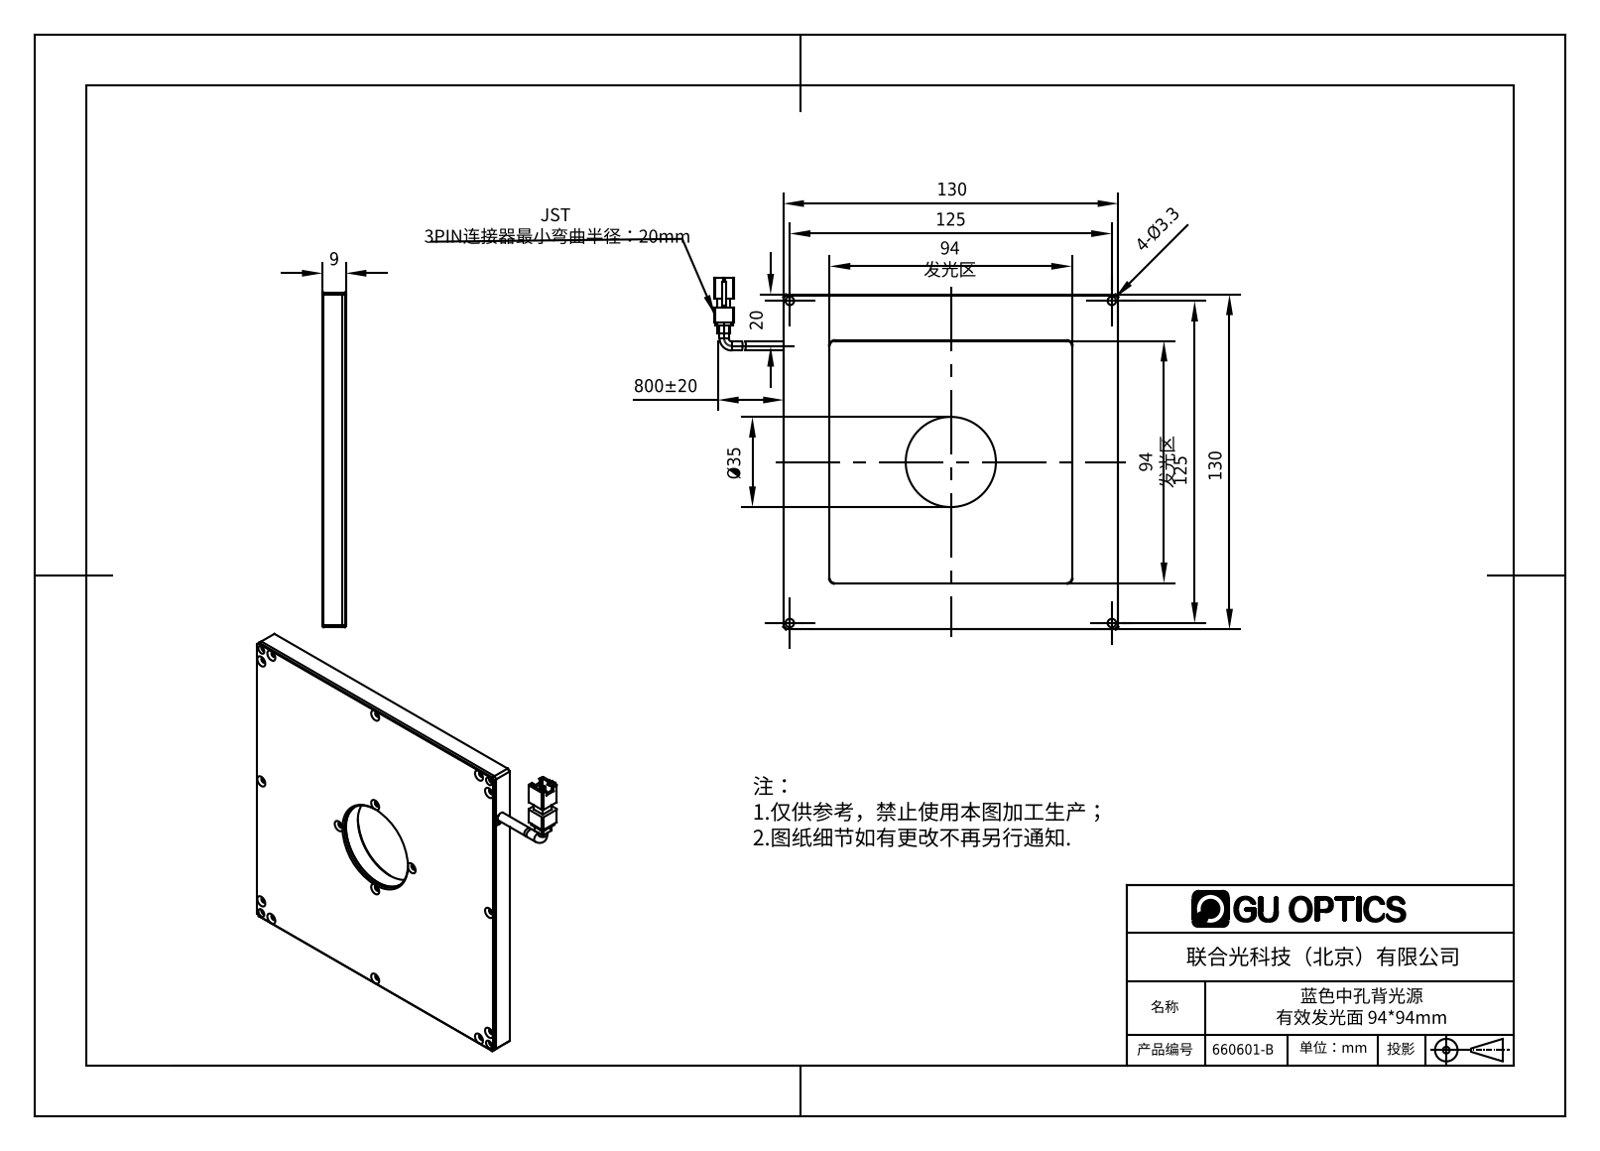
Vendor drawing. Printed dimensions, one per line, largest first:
800±20
130
130
125
125
94 发光区
94 发光区
Ø35
20
9
4-Ø3.3
